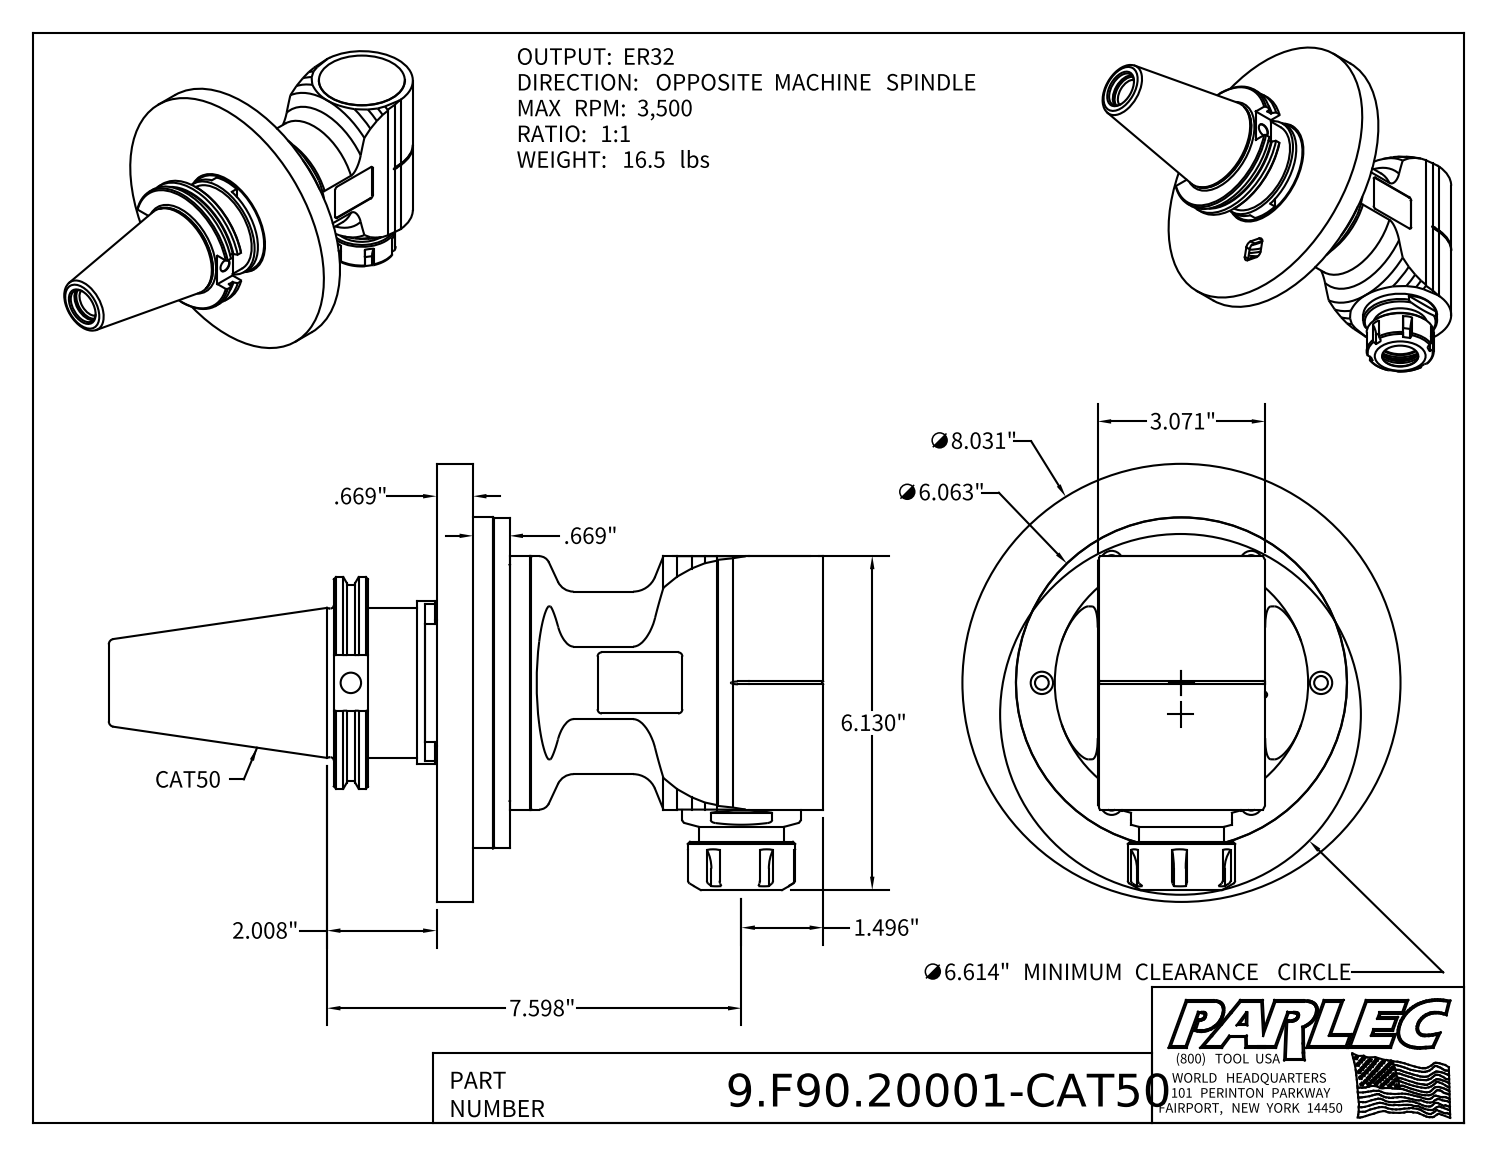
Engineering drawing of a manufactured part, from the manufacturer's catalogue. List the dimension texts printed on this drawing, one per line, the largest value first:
∅8.031"
7.598"
∅6.614" MINIMUM CLEARANCE CIRCLE
6.130"
∅6.063"
3.071"
2.008"
1.496"
.669"
.669"
